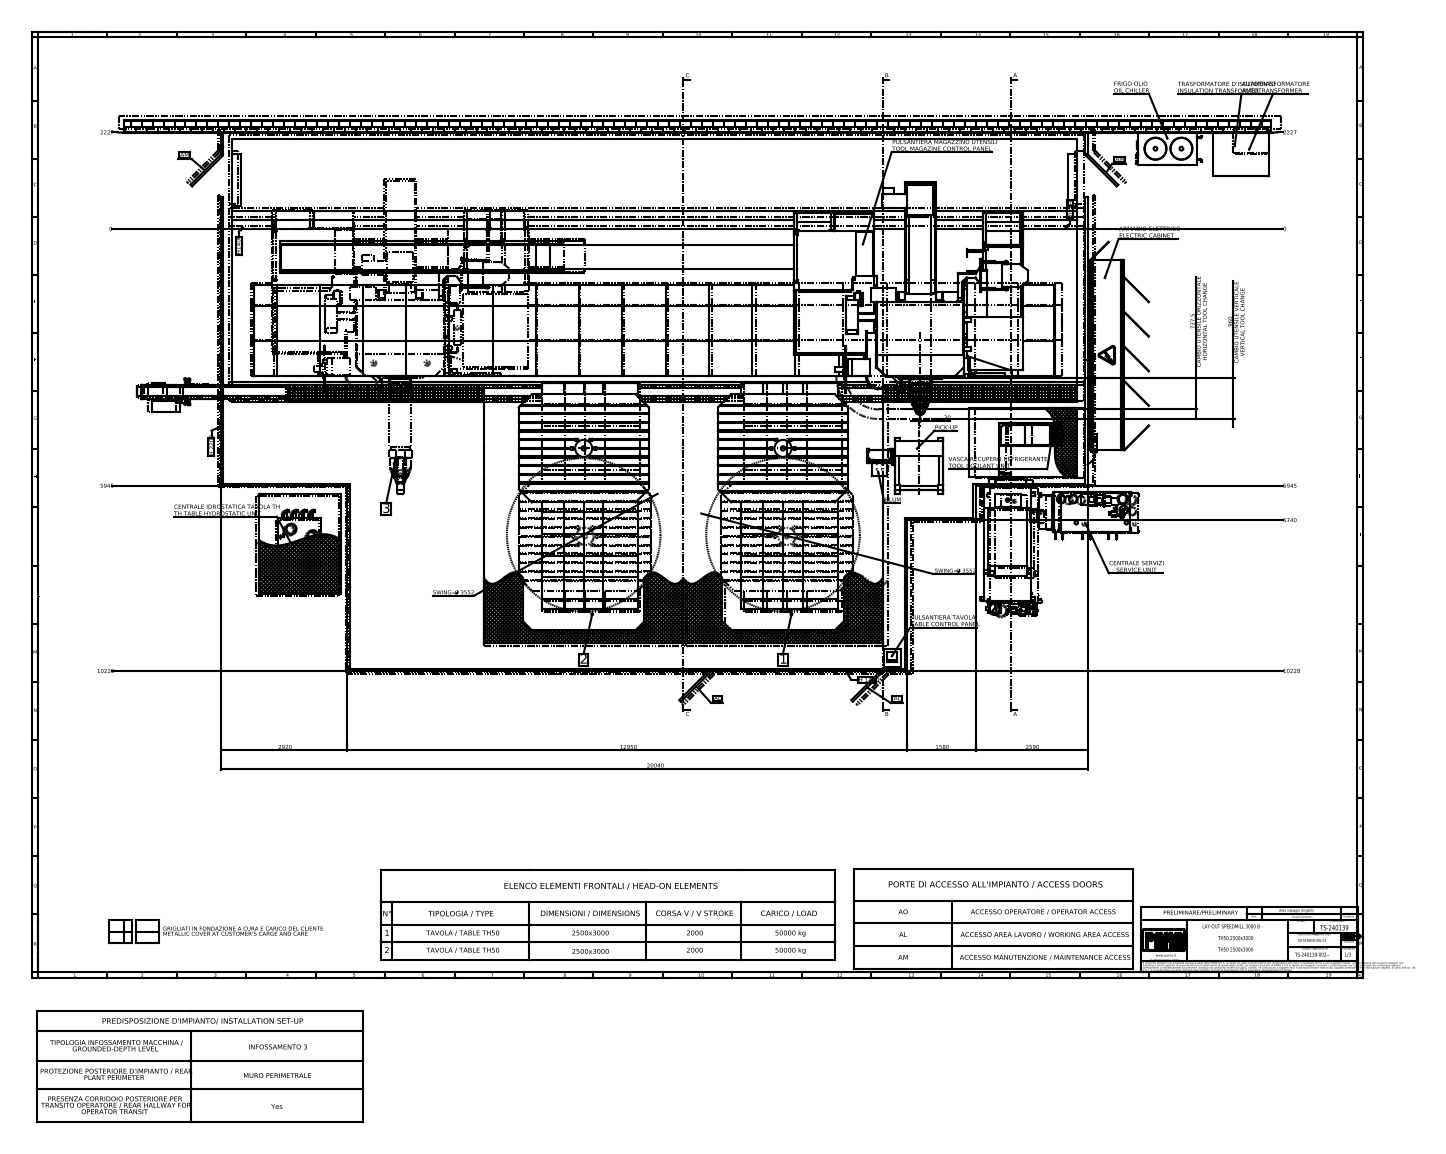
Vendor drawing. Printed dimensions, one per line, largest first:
20040
12950
10228
10228
6740
5945
5945
SWING= Ø 3552
SWING= Ø 3552
2920
2590
2227
2227
1580
960 CAMBIO UTENSILE VERTICALE VERTICAL TOOL CHANGE
737,5 CAMBIO UTENSILE ORIZZONTALE HORIZONTAL TOOL CHANGE
30
0
0
